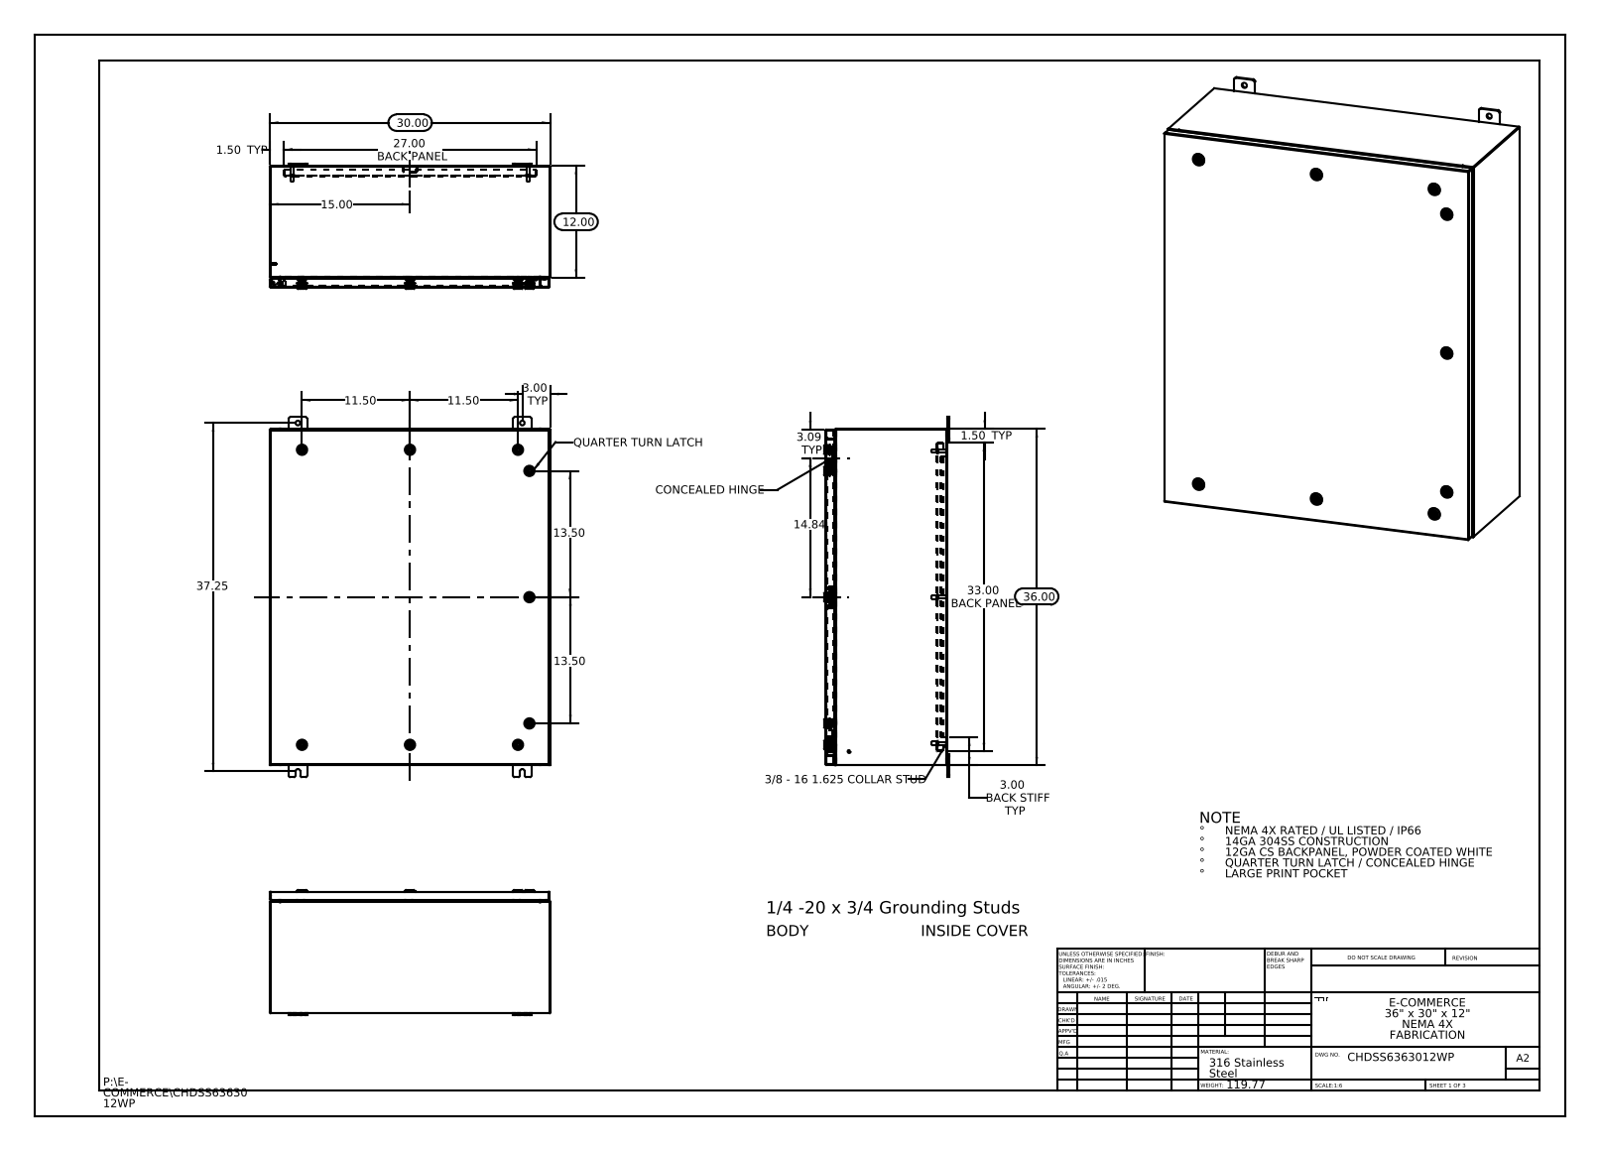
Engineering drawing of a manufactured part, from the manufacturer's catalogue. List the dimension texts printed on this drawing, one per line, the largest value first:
37.25
36.00
33.00 BACK PANEL
30.00
27.00 BACK PANEL
15.00
14.84
13.50
13.50
12.00
11.50
11.50
3.09 TYP
3.00 TYP
3.00 BACK STIFF TYP
1.50 TYP
1.50 TYP
